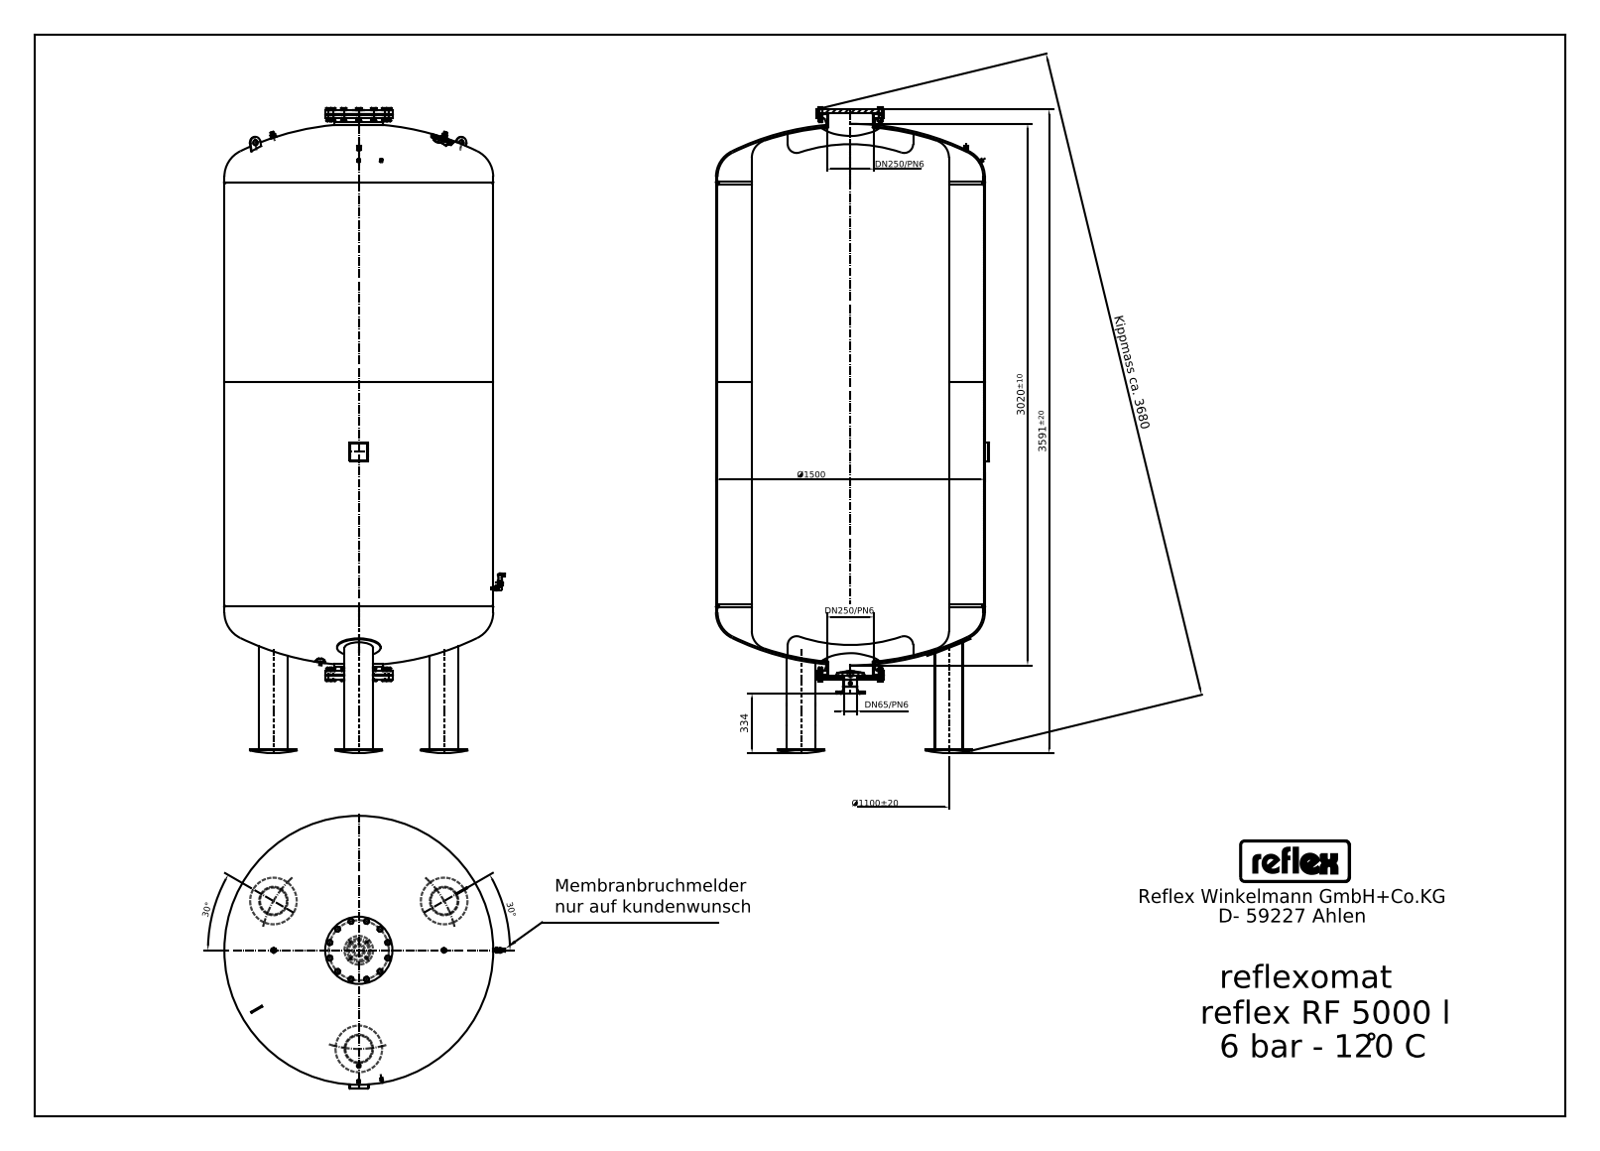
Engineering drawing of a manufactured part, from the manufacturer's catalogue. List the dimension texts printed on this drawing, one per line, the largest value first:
Kippmass ca. 3680
3591±20
3020±10
Ø1500
Ø1100±20
334
DN250/PN6
DN250/PN6
DN65/PN6
30°
30°
